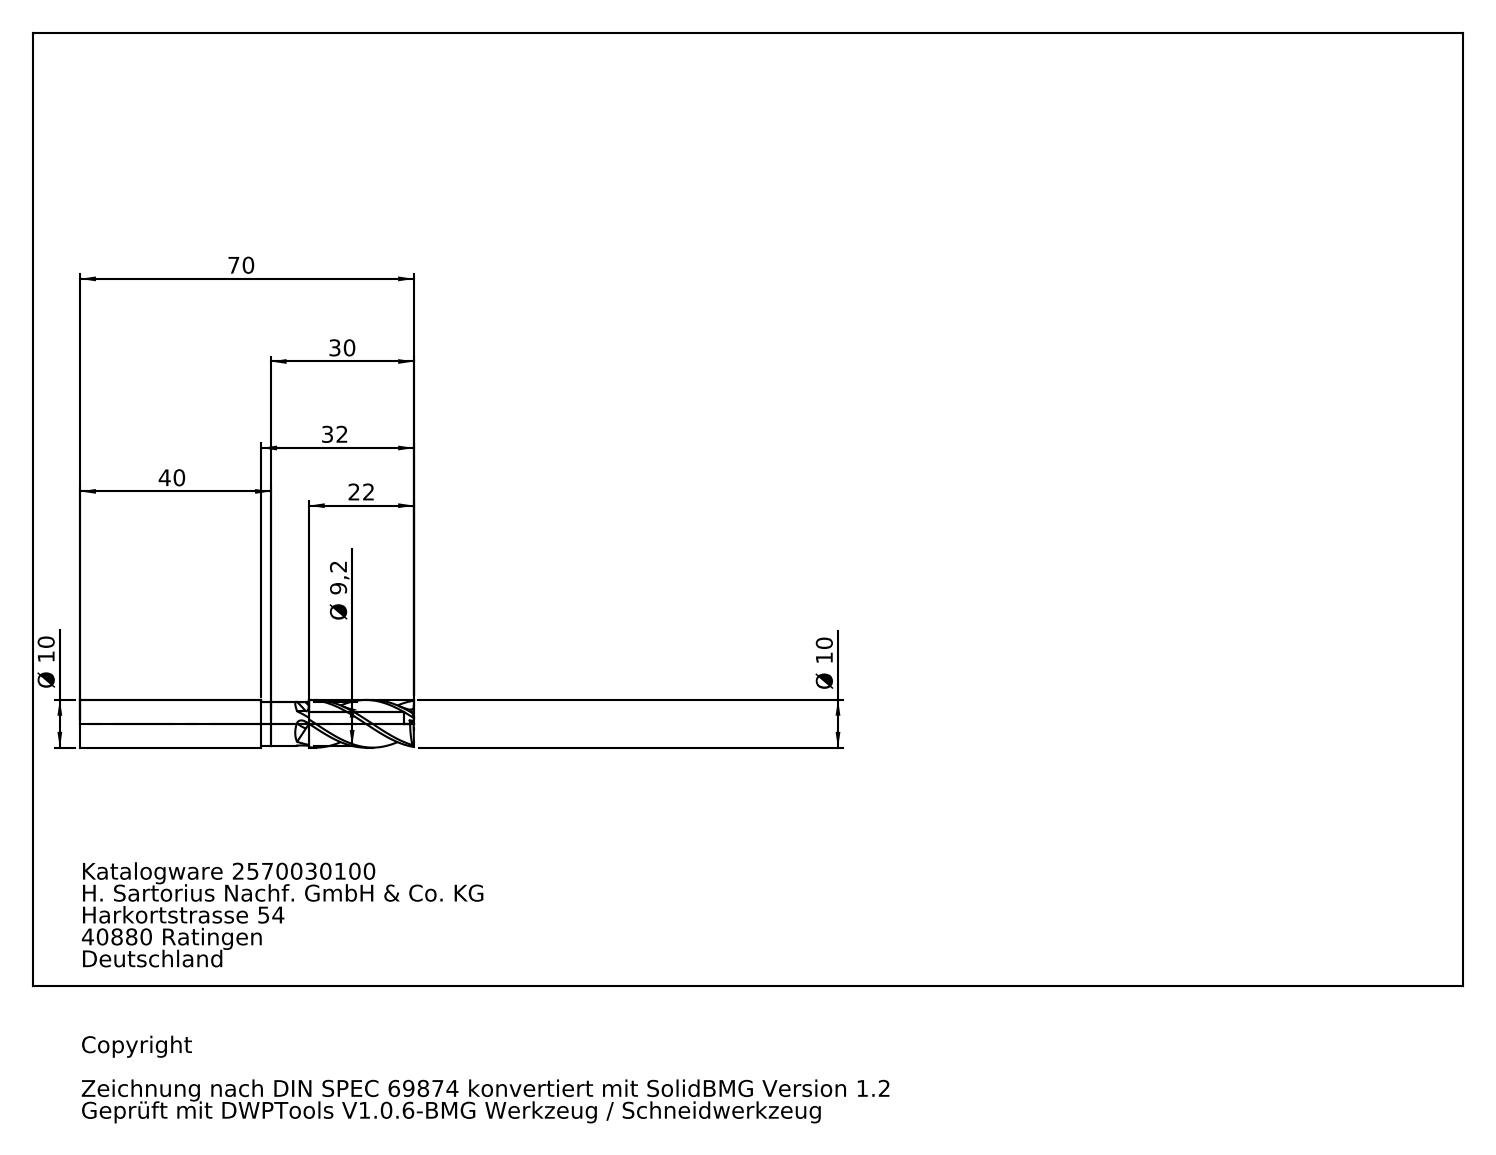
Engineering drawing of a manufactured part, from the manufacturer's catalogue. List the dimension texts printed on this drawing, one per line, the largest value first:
70
40
32
30
22
Ø 10
Ø 10
Ø 9,2
